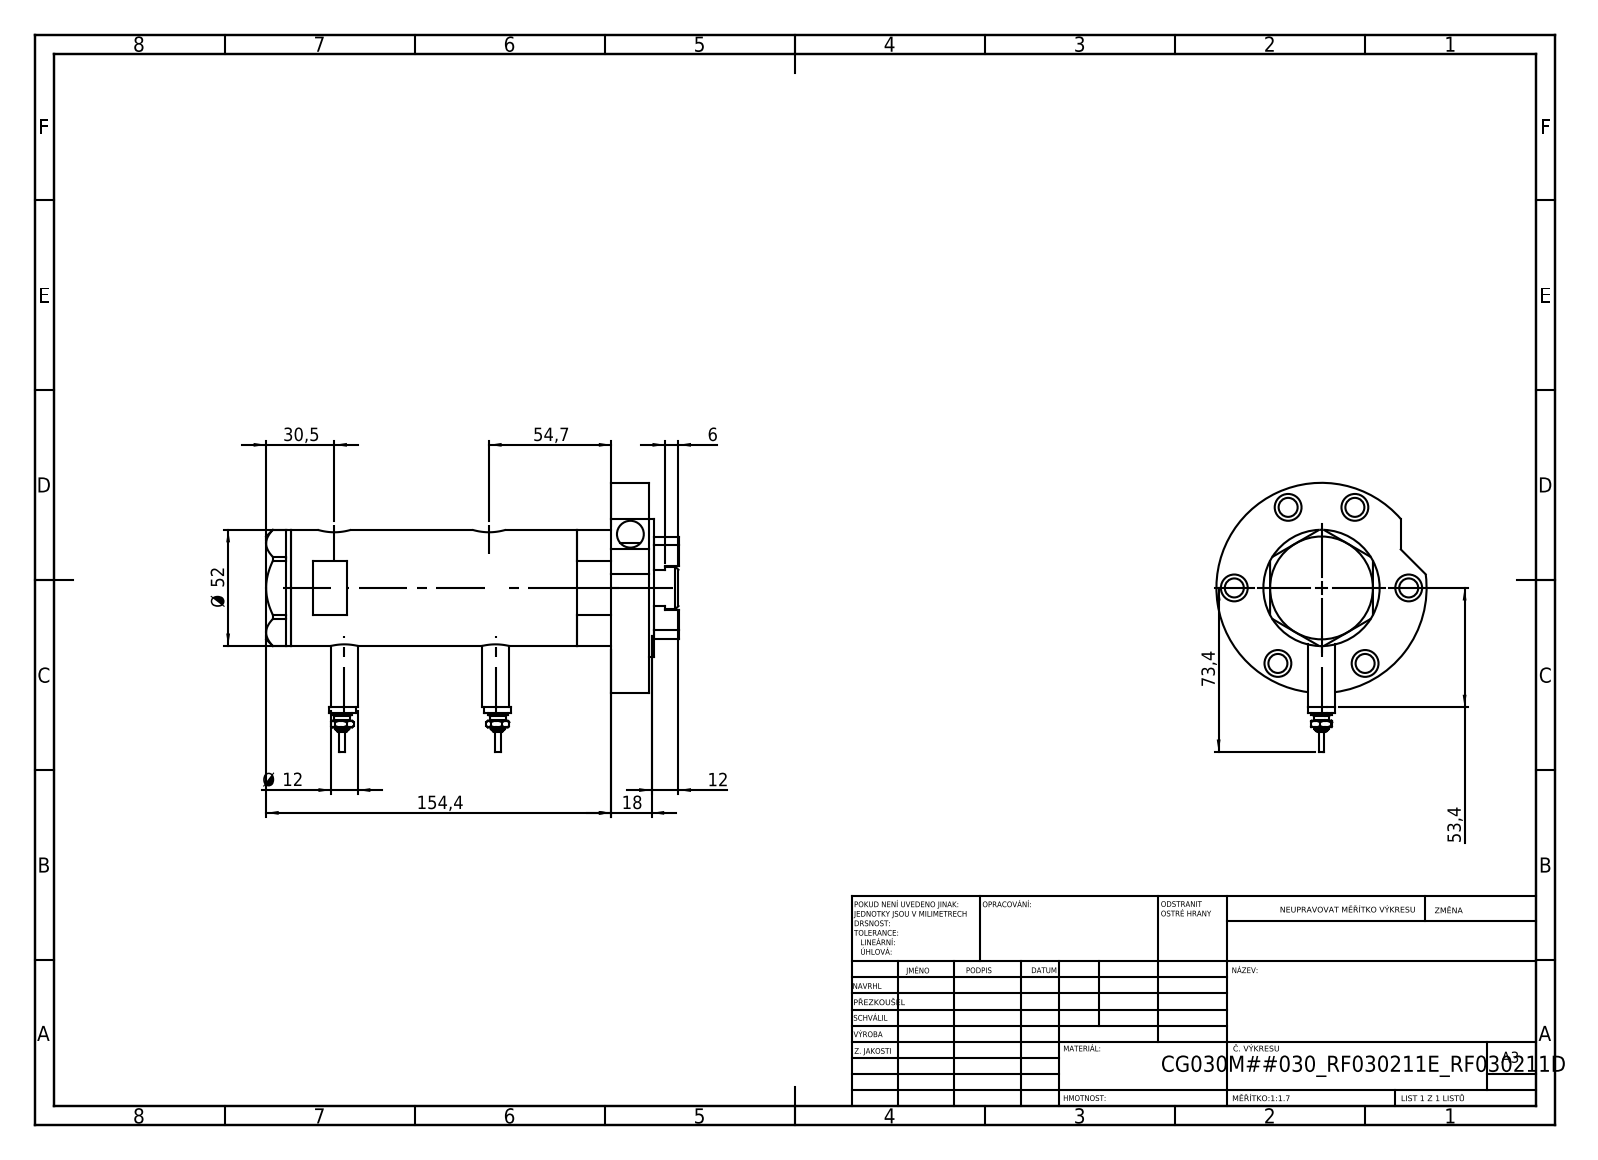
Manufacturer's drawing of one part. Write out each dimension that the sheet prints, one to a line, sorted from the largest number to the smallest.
154,4
73,4
54,7
53,4
Ø 52
30,5
18
12
Ø 12
6
